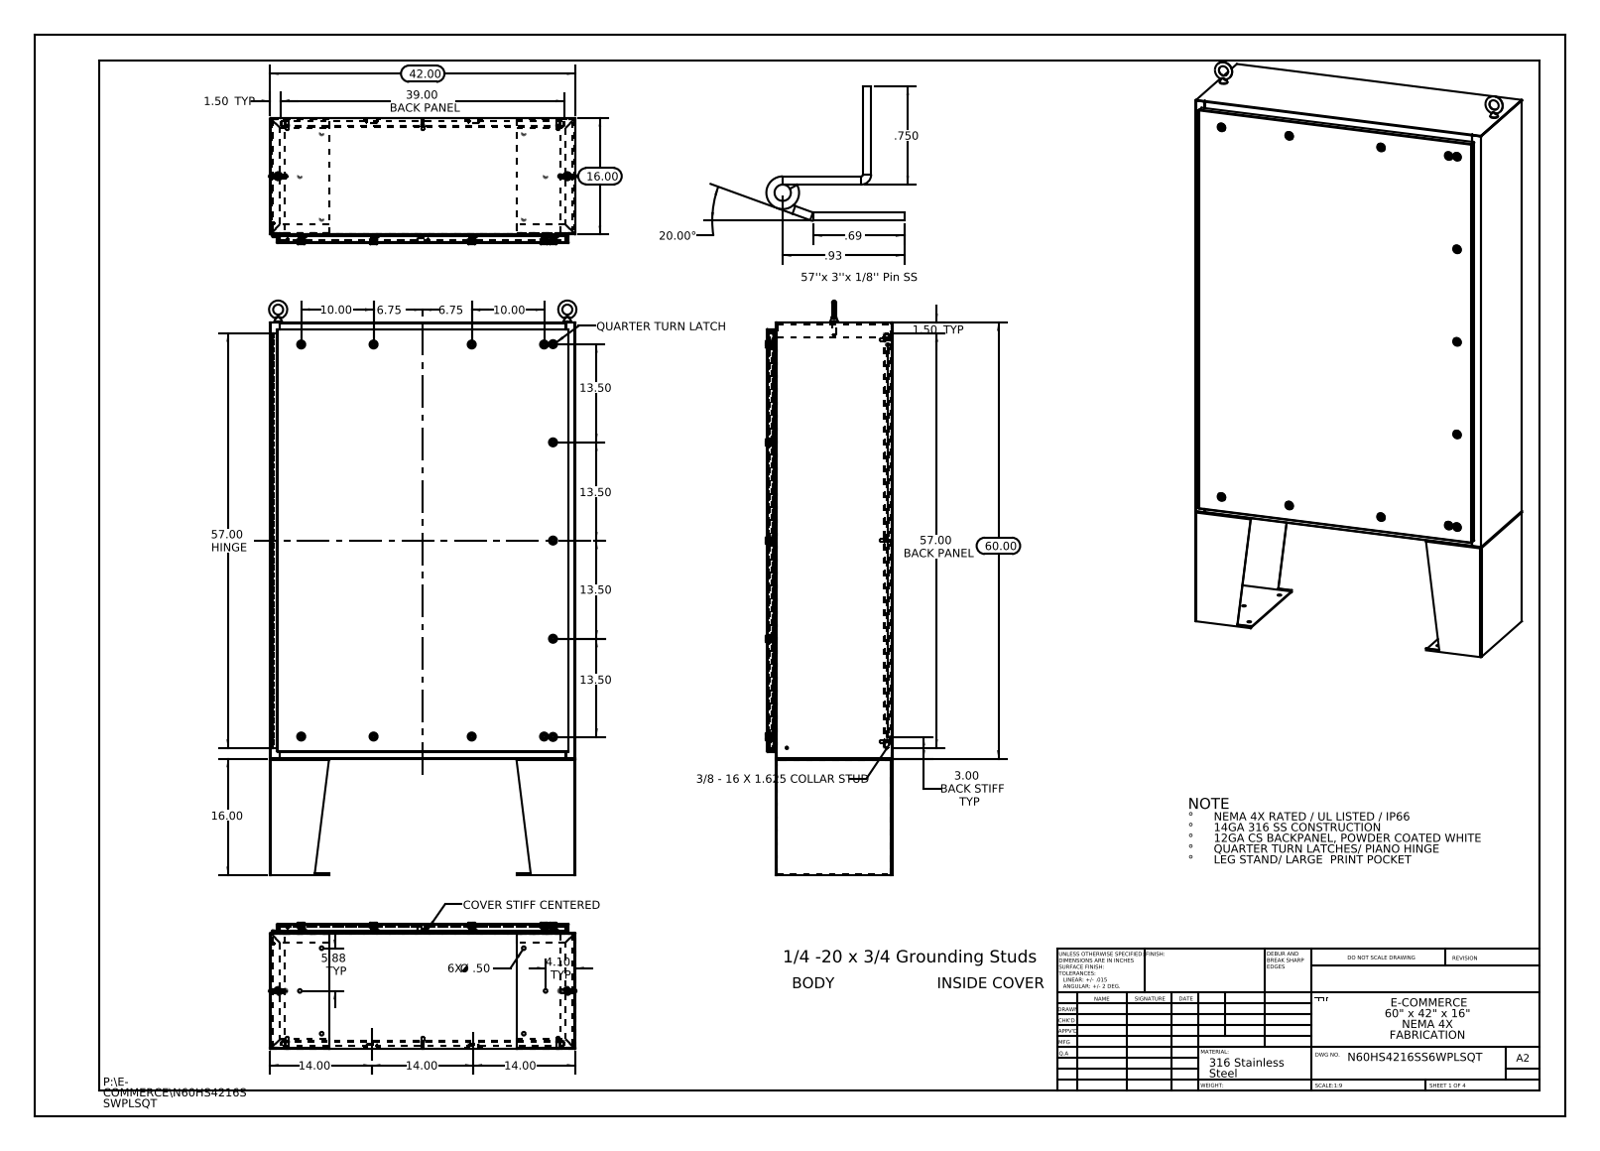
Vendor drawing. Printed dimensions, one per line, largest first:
60.00
57.00 HINGE
57.00 BACK PANEL
42.00
39.00 BACK PANEL
20.00°
16.00
16.00
14.00
14.00
14.00
13.50
13.50
13.50
13.50
10.00
10.00
6.75
6.75
5.88 TYP
4.10 TYP
3.00 BACK STIFF TYP
1.50 TYP
1.50 TYP
.93
.750
.69
6X Ø .50
